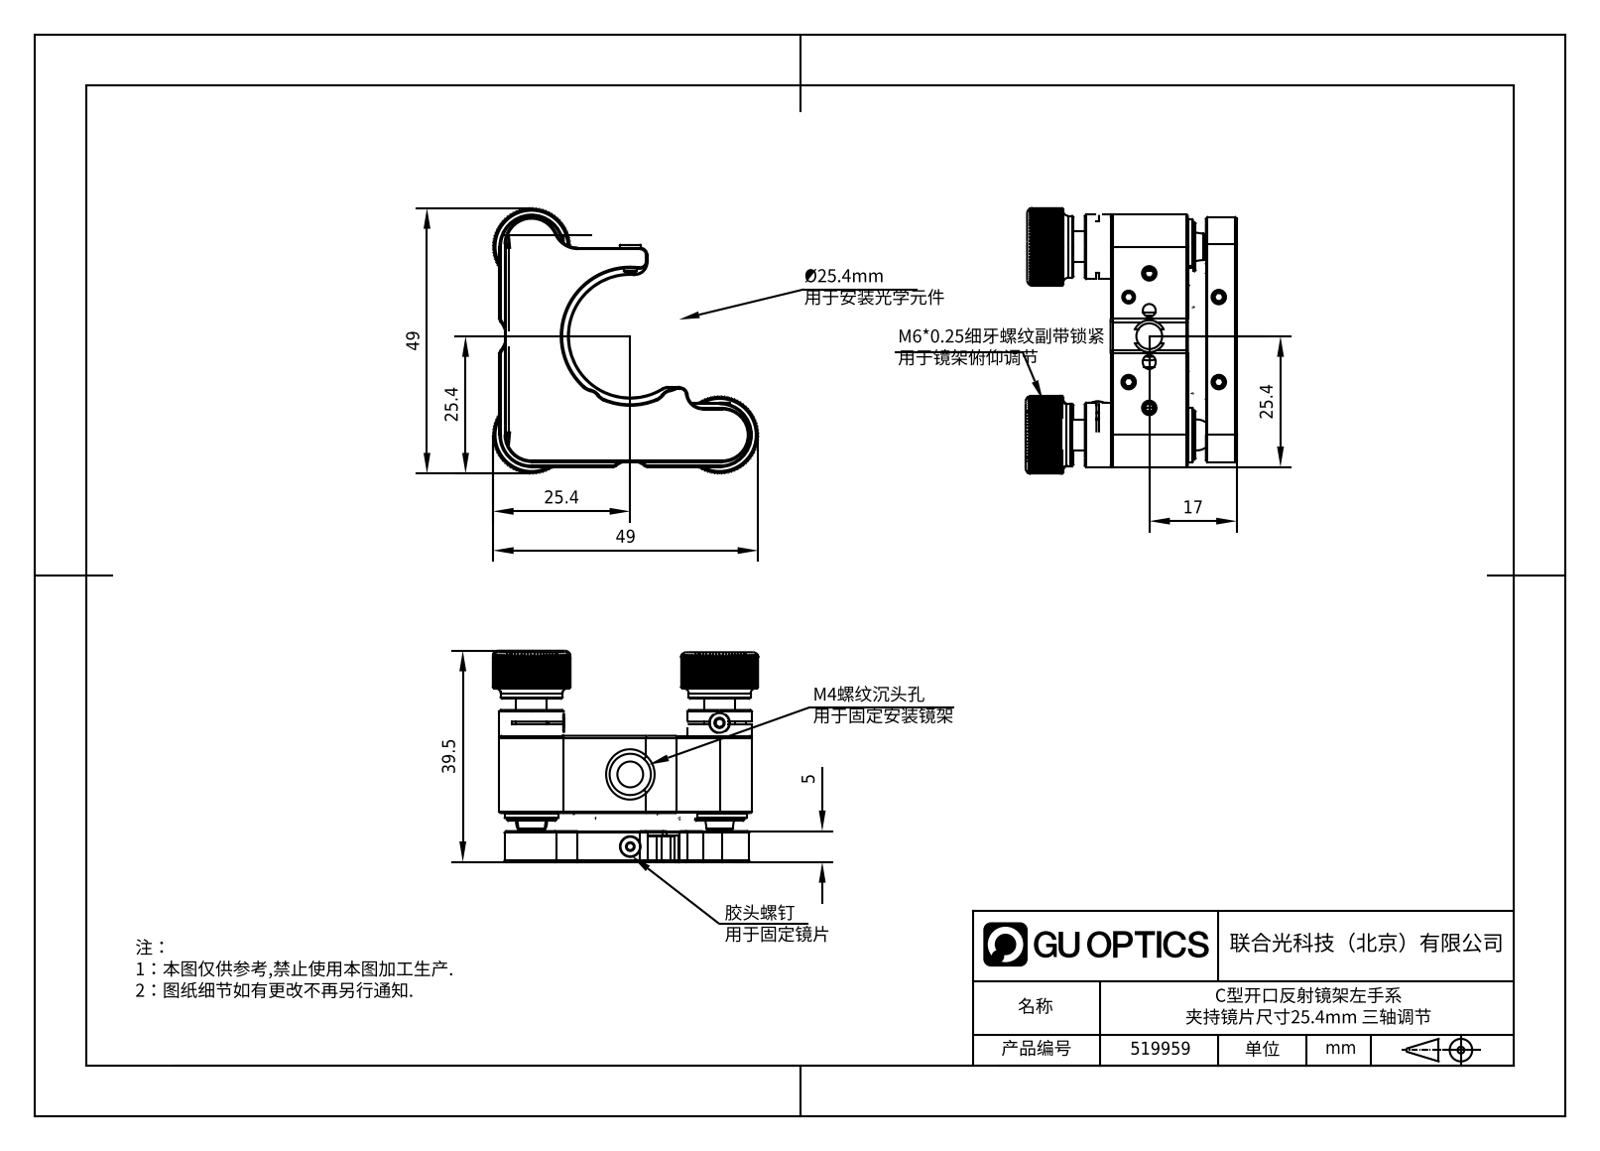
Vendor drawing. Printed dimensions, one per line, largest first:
49
49
39.5
25.4
25.4
25.4
17
5
